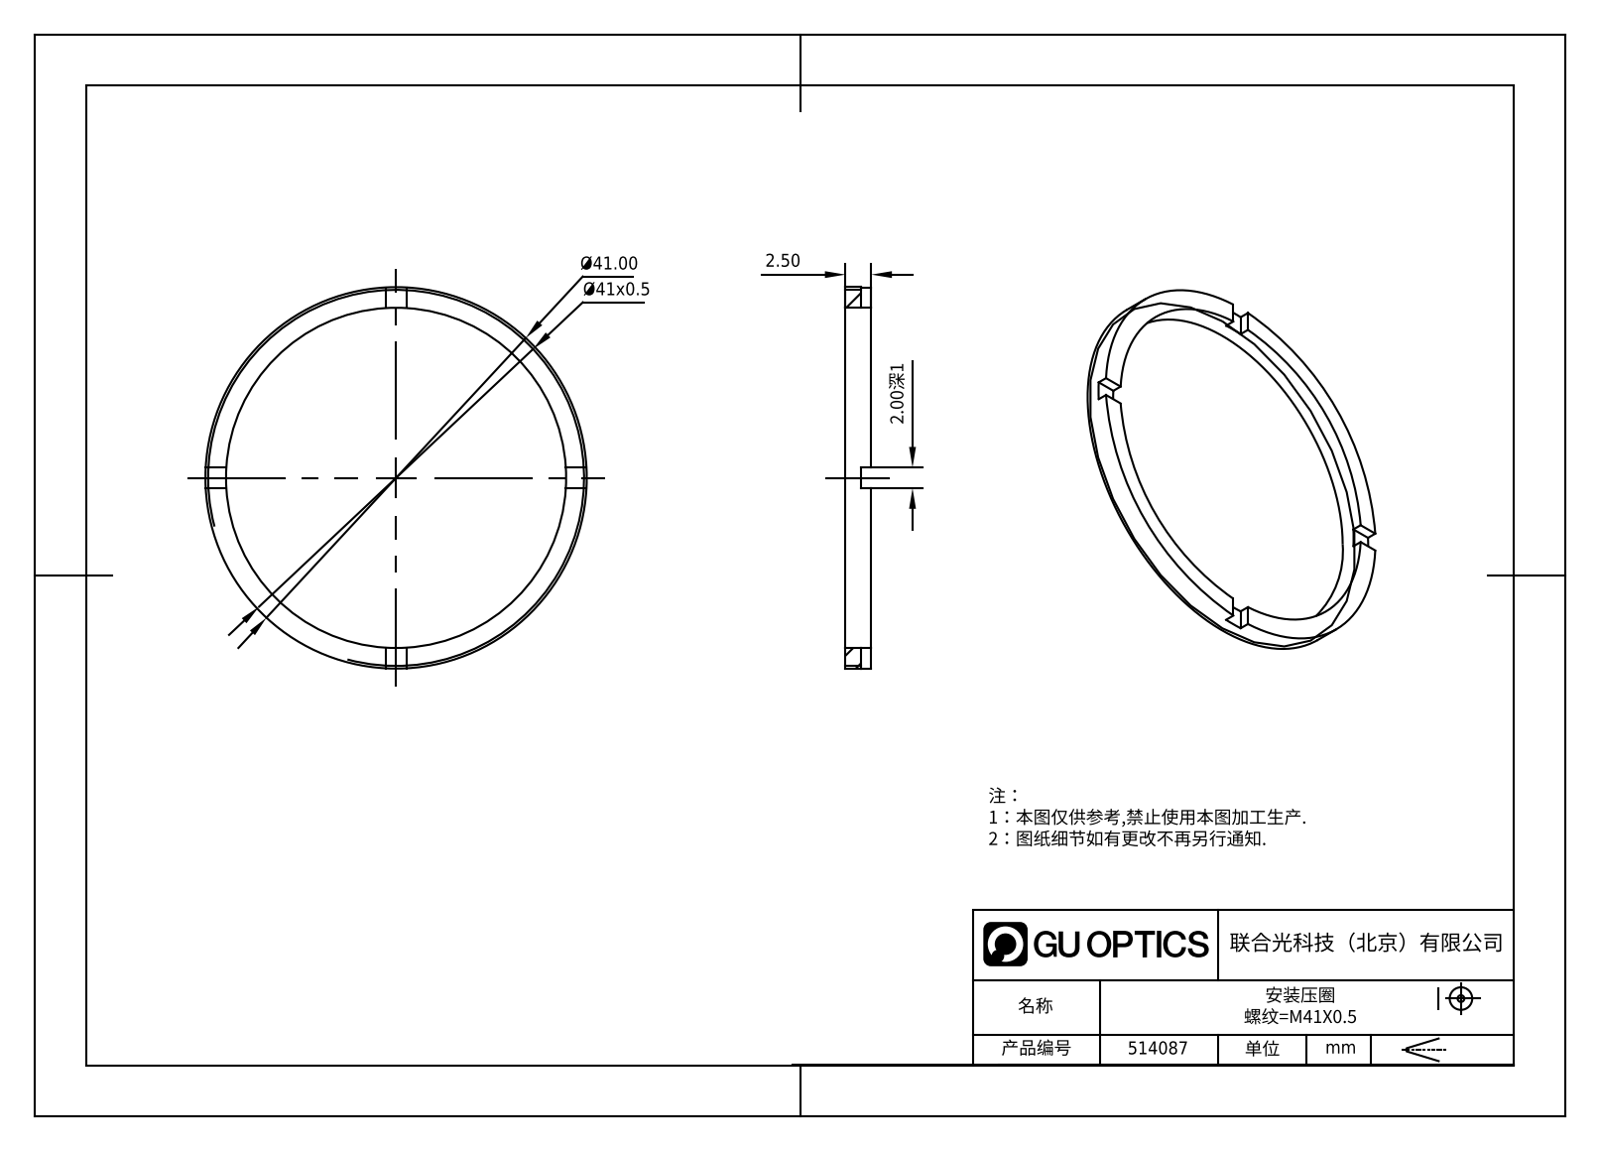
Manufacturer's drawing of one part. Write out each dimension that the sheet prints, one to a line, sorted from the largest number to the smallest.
Ø41.00
Ø41x0.5
2.50
2.00深1
